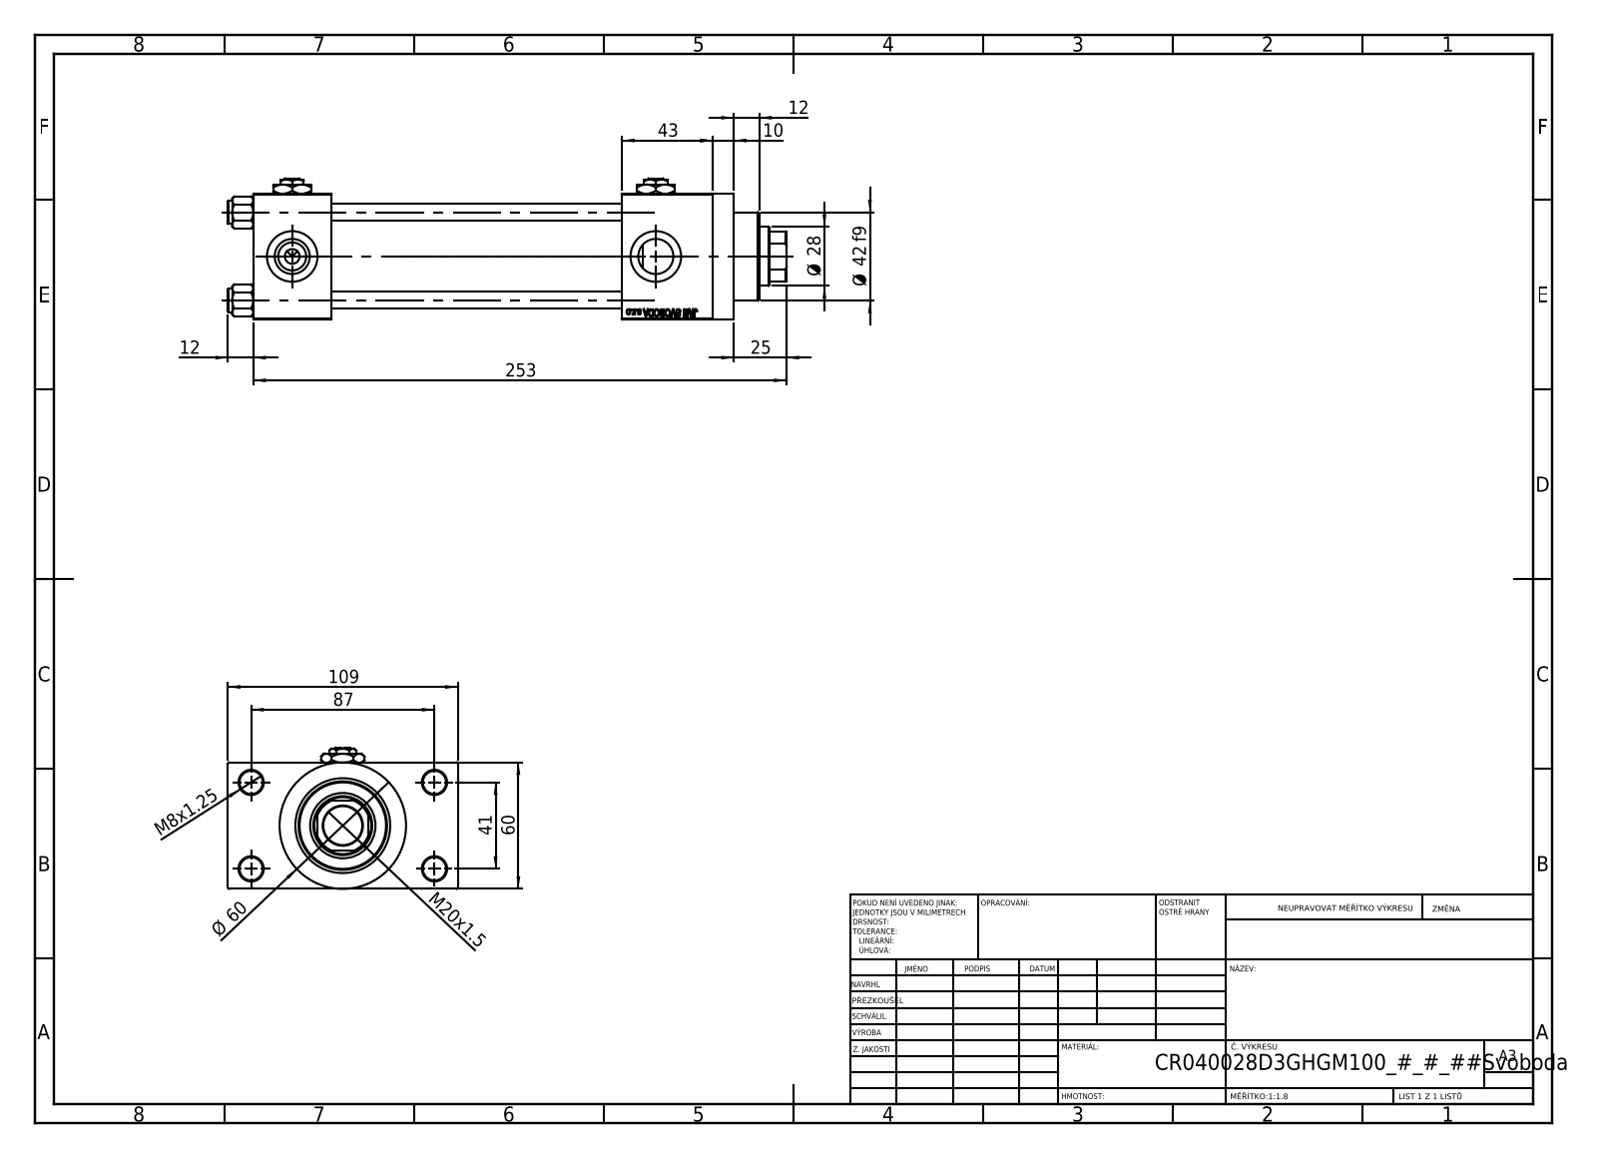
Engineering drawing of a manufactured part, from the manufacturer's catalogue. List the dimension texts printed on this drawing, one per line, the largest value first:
253
109
87
Ø 60
60
43
Ø 42 f9
41
Ø 28
25
M20x1.5
12
12
10
M8x1.25
